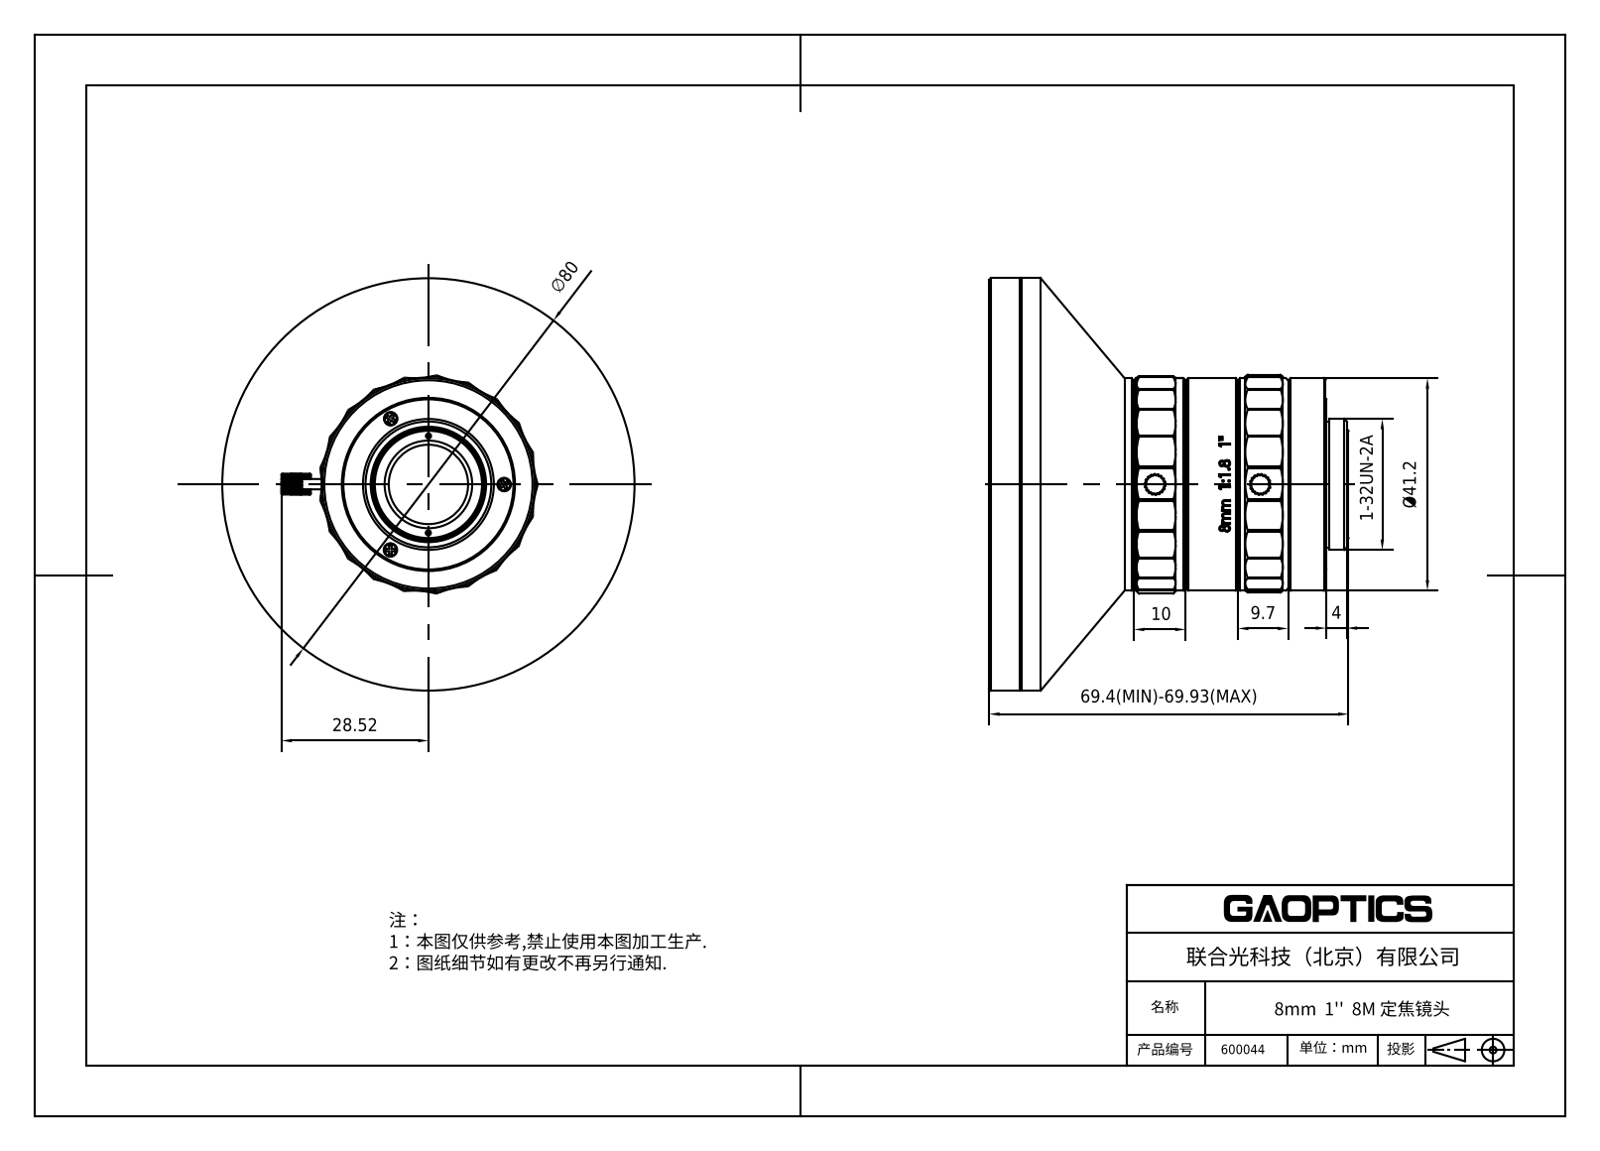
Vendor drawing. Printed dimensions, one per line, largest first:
∅80
69.4(MIN)-69.93(MAX)
Ø41.2
28.52
10
9.7
4
1-32UN-2A
